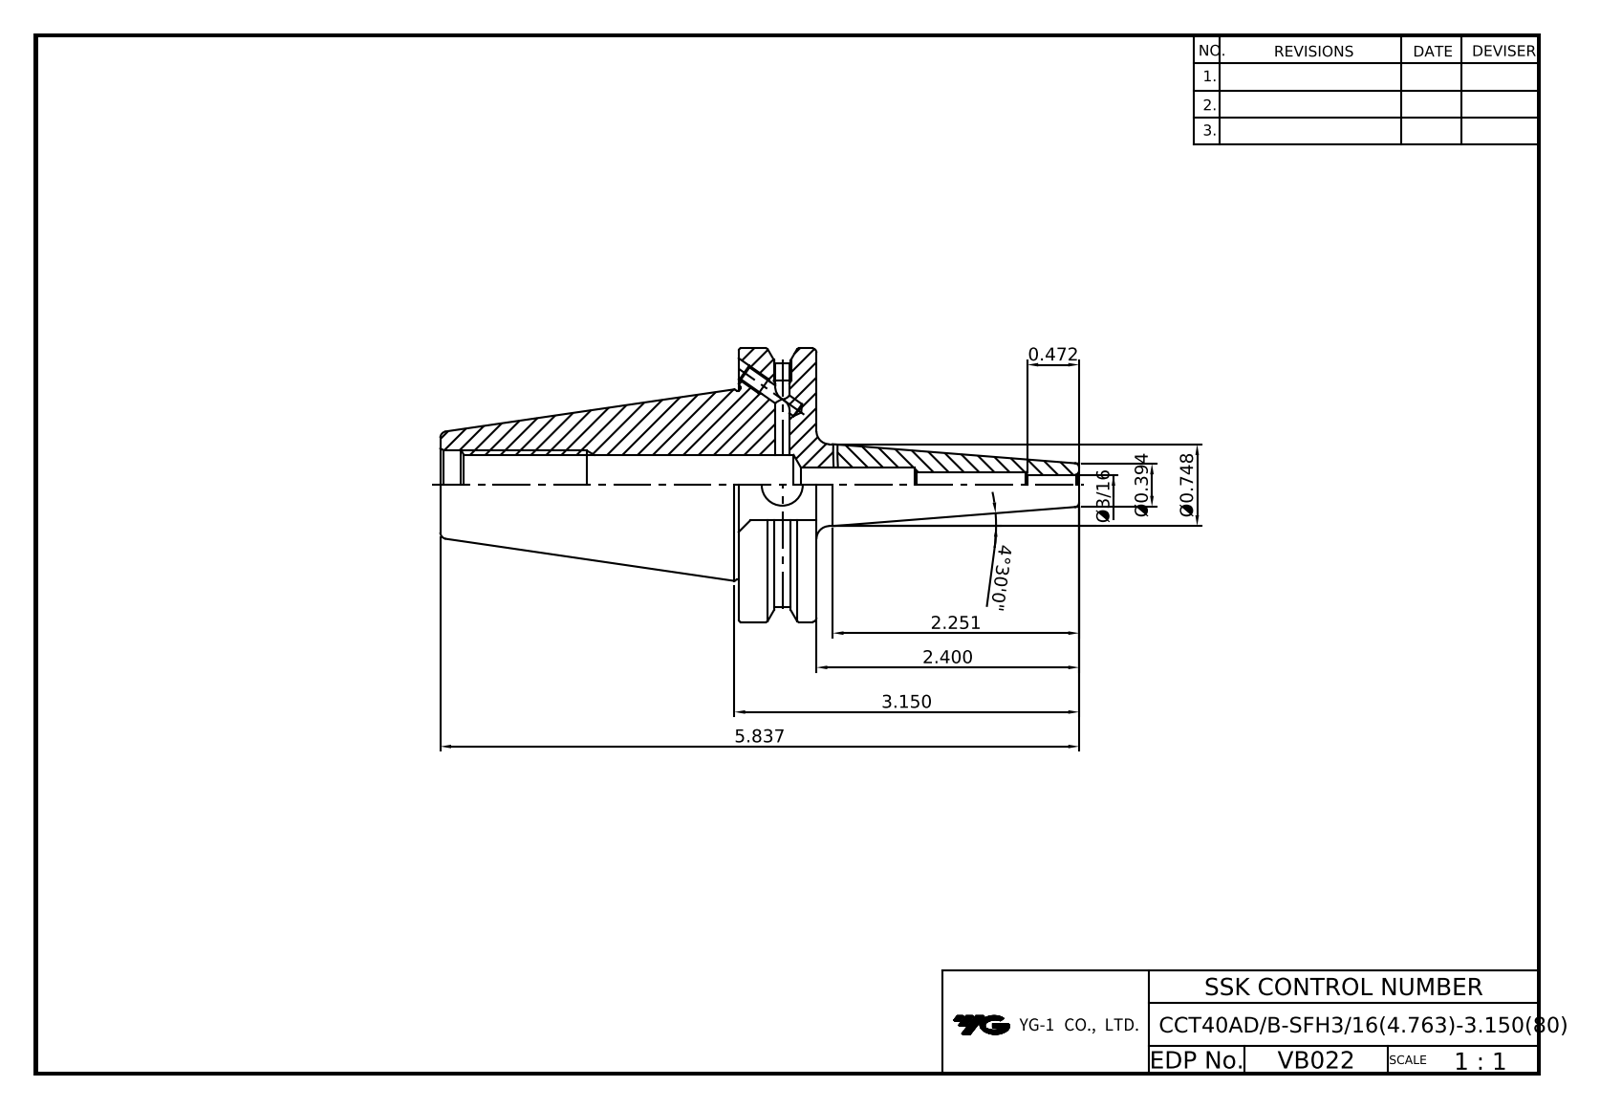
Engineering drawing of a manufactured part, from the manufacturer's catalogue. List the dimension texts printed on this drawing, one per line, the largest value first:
5.837
4°30'0"
3.150
2.400
2.251
Ø0.748
0.472
Ø0.394
